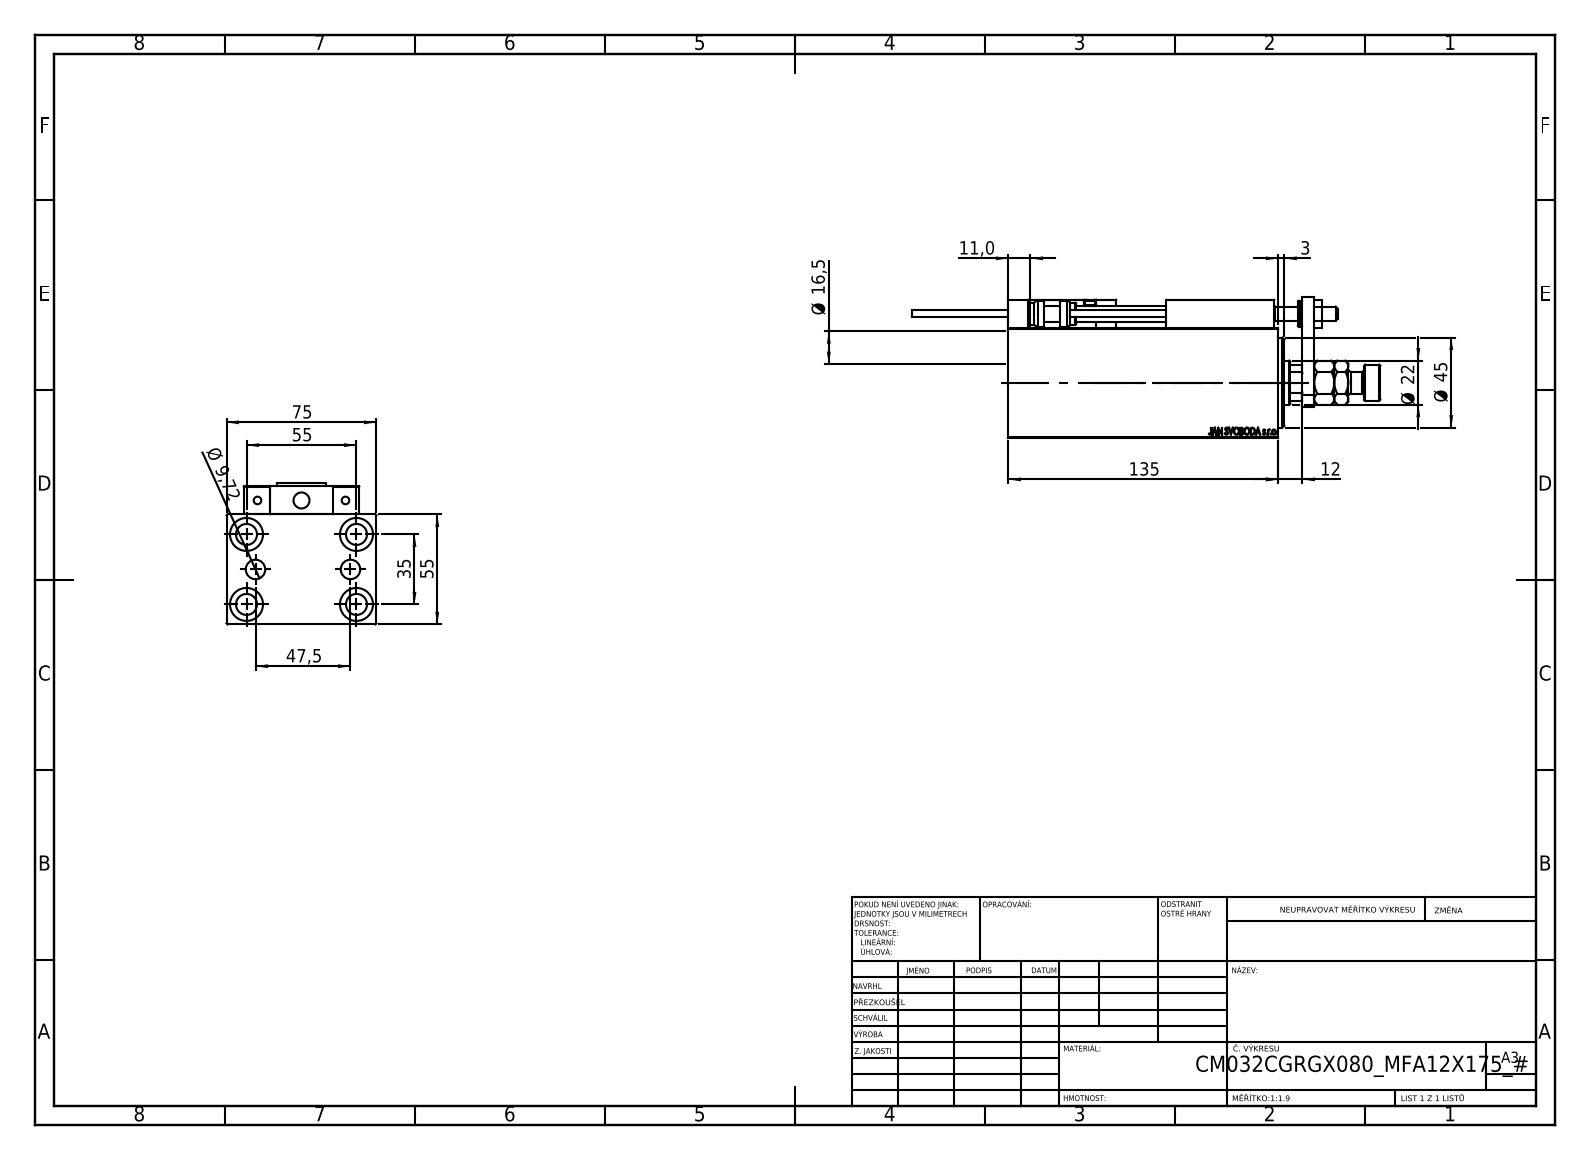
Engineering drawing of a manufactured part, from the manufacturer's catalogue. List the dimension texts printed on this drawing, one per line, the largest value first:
135
75
55
55
47,5
Ø 45
35
Ø 22
Ø 16,5
12
11,0
Ø 9,72
3
